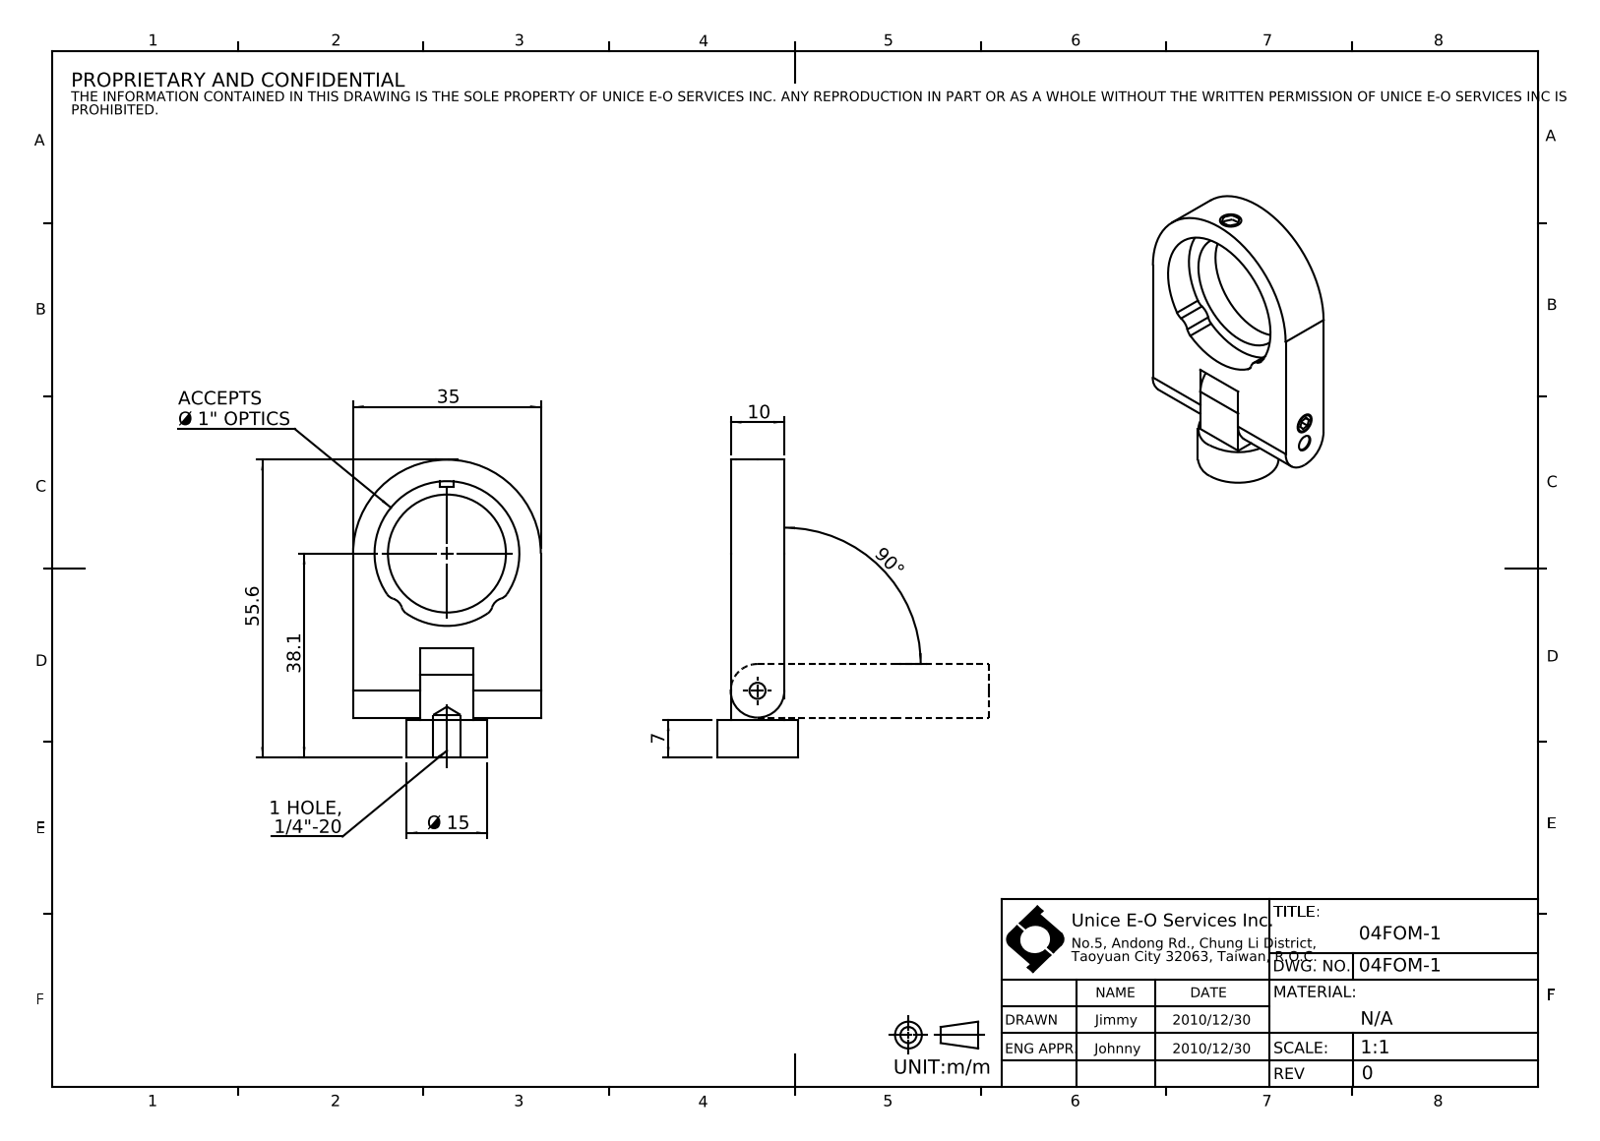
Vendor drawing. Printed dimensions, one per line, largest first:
90°
55.6
38.1
35
Ø 15
10
7
ACCEPTS Ø 1" OPTICS
